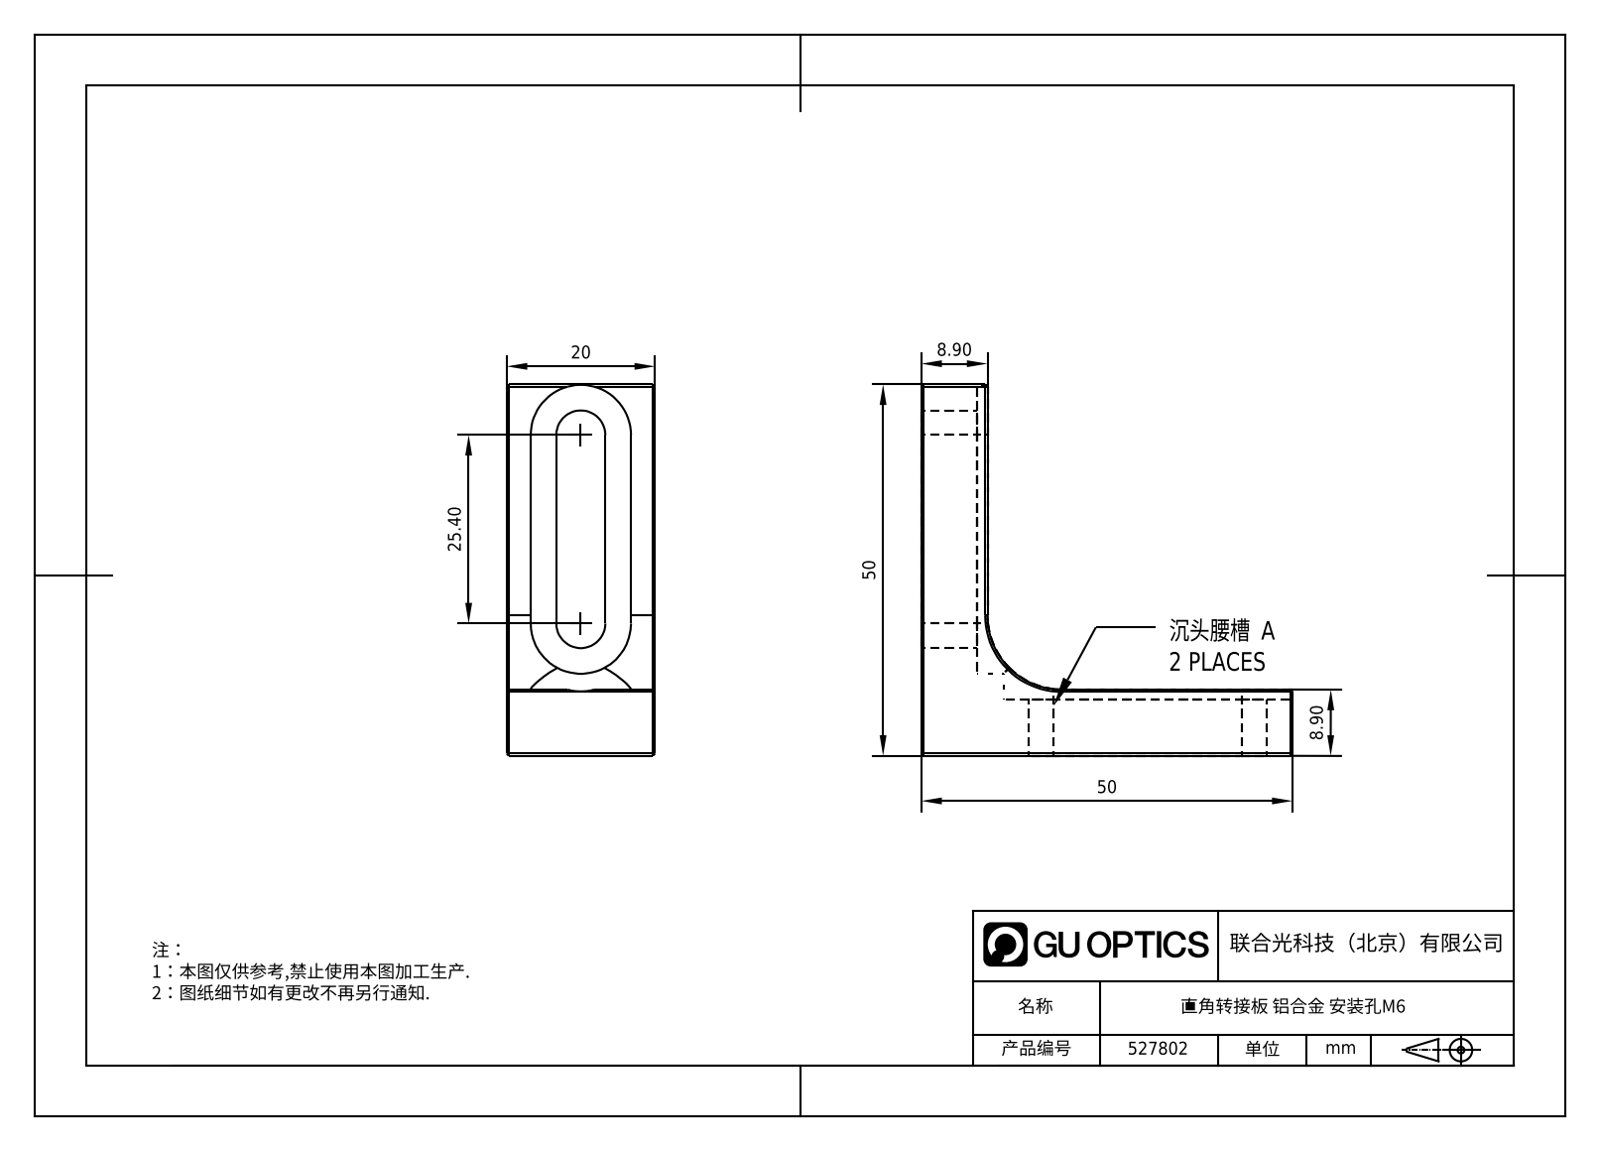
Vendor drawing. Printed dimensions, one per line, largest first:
50
50
25.40
20
8.90
8.90
